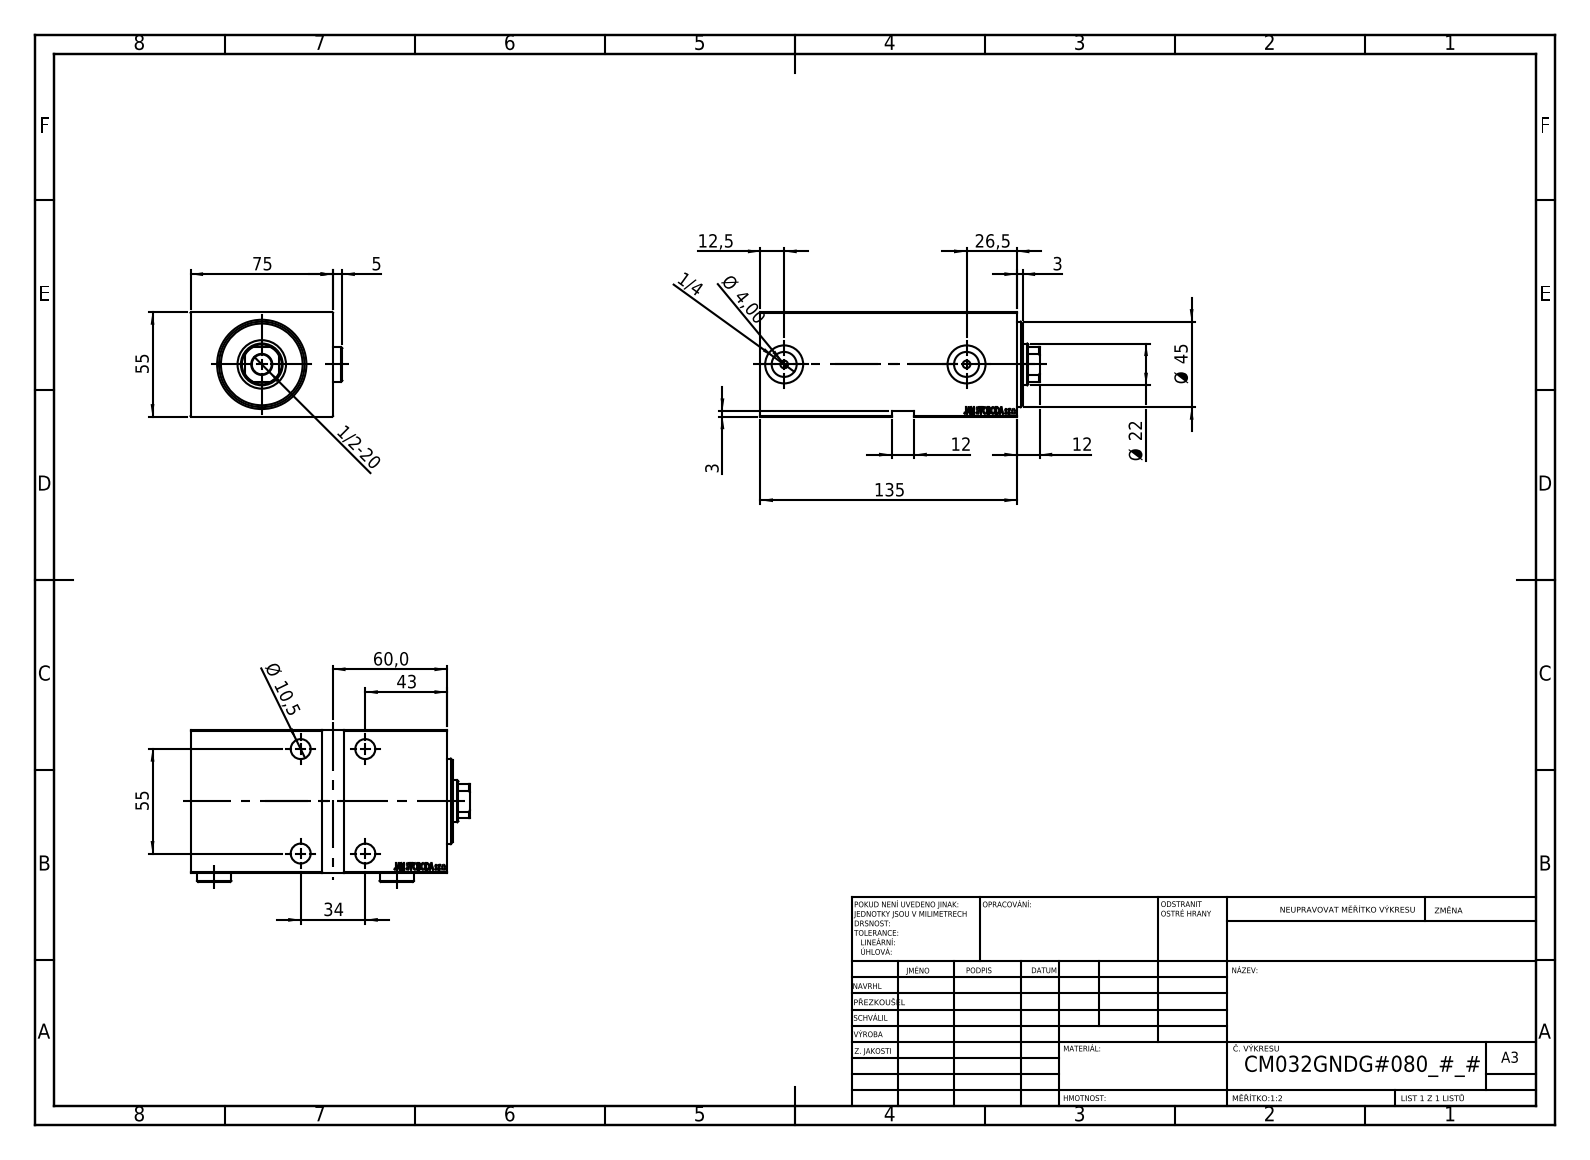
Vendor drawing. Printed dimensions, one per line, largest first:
135
75
60,0
55
55
Ø 45
43
34
26,5
Ø 22
12,5
12
12
Ø 10,5
5
Ø 4,00
3
3
1/2-20
1/4
